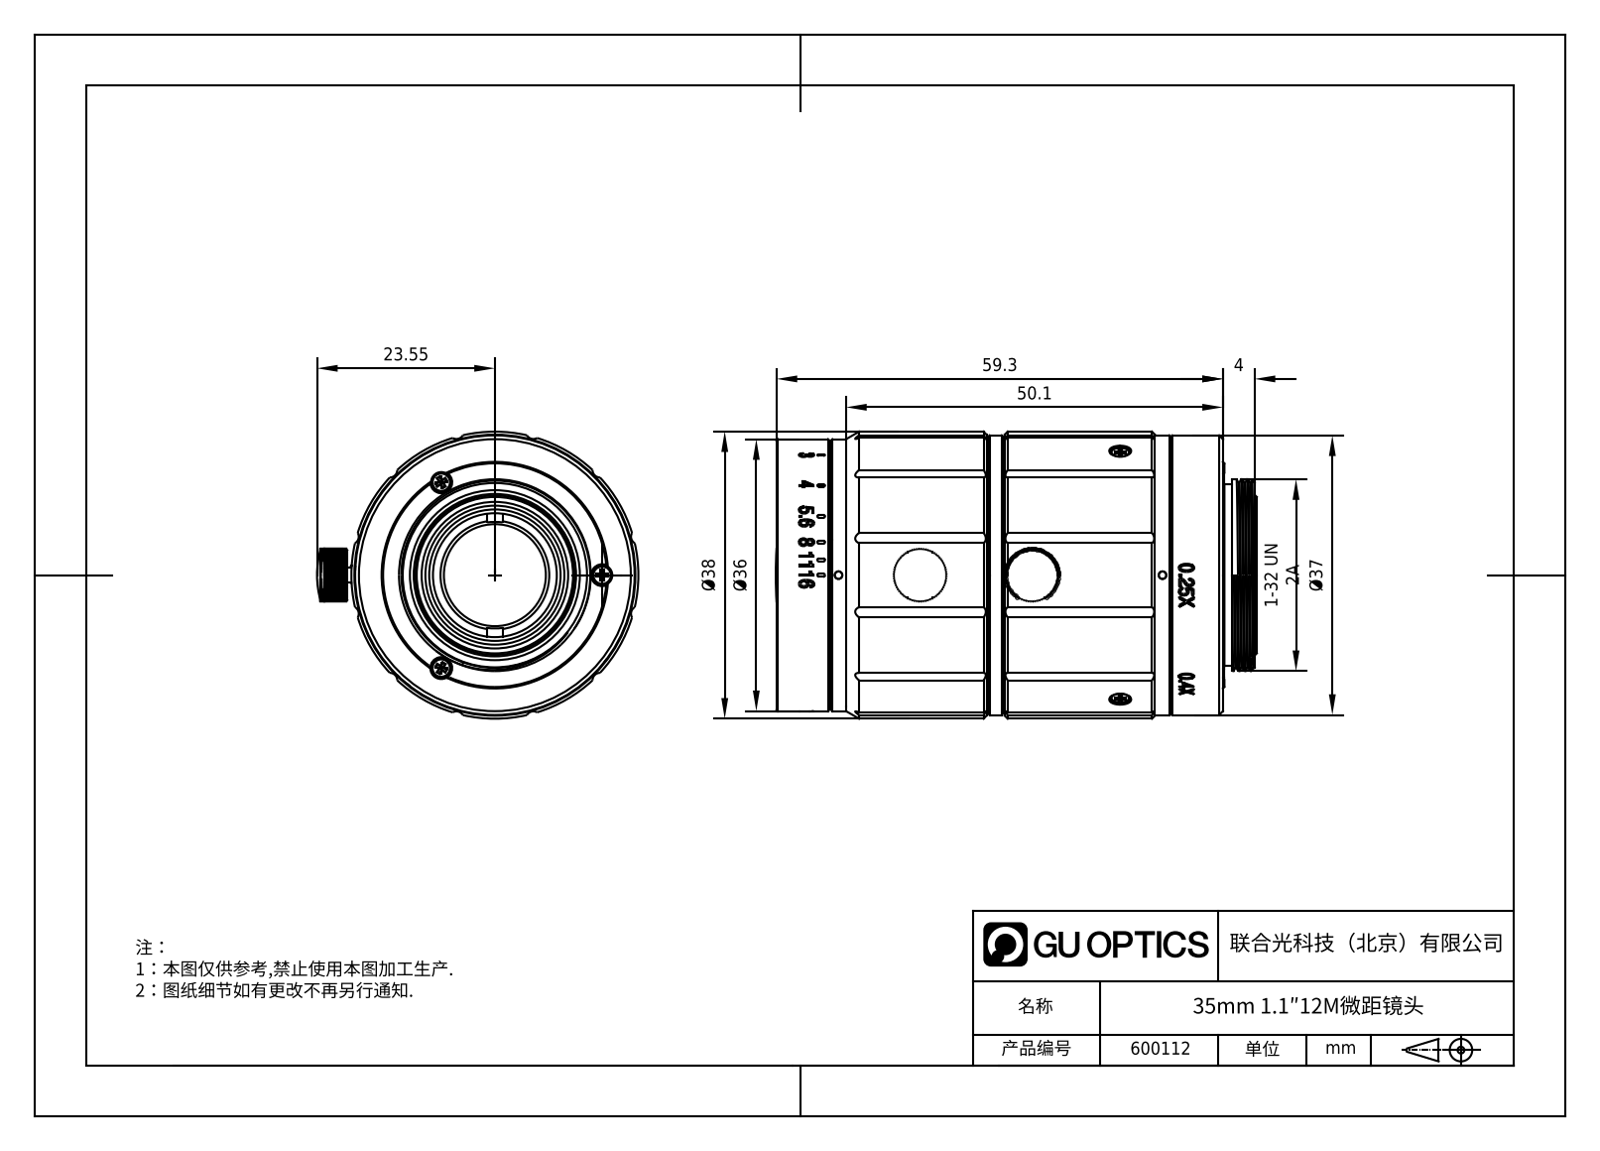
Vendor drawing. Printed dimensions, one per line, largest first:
59.3
50.1
Ø38
Ø37
Ø36
23.55
4
1-32 UN 2A
